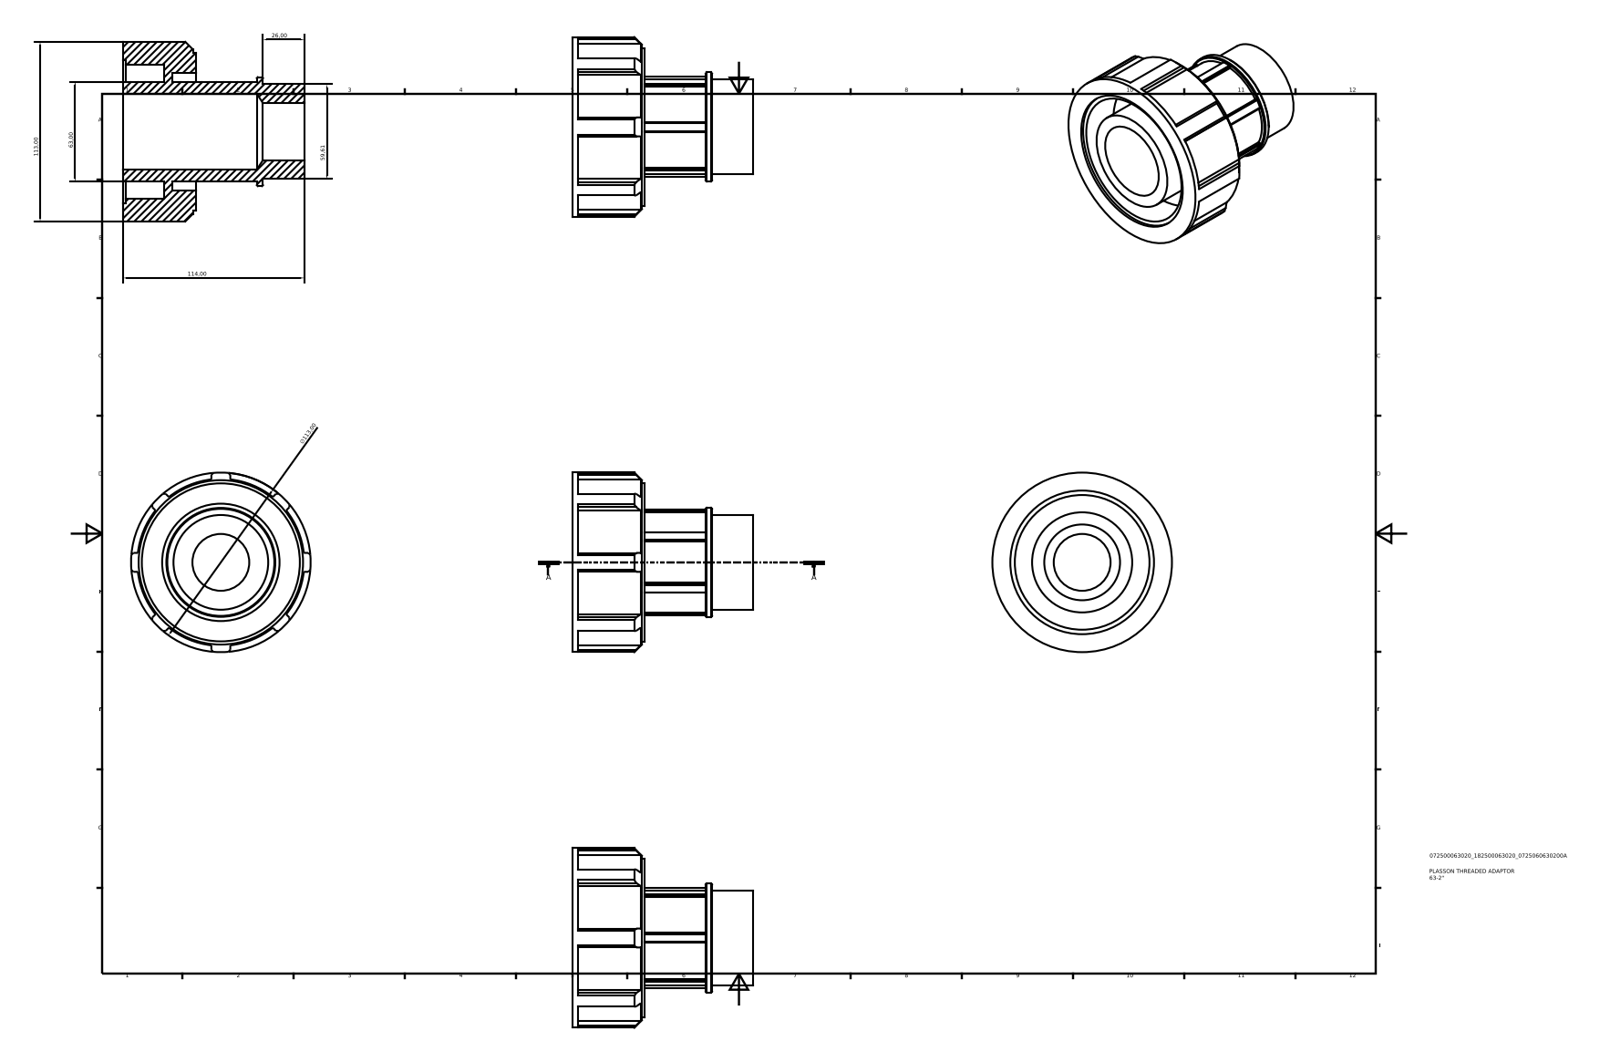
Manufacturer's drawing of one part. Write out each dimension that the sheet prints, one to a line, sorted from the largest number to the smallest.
114,00
113,00
∅113,00
63,00
59,61
26,00
